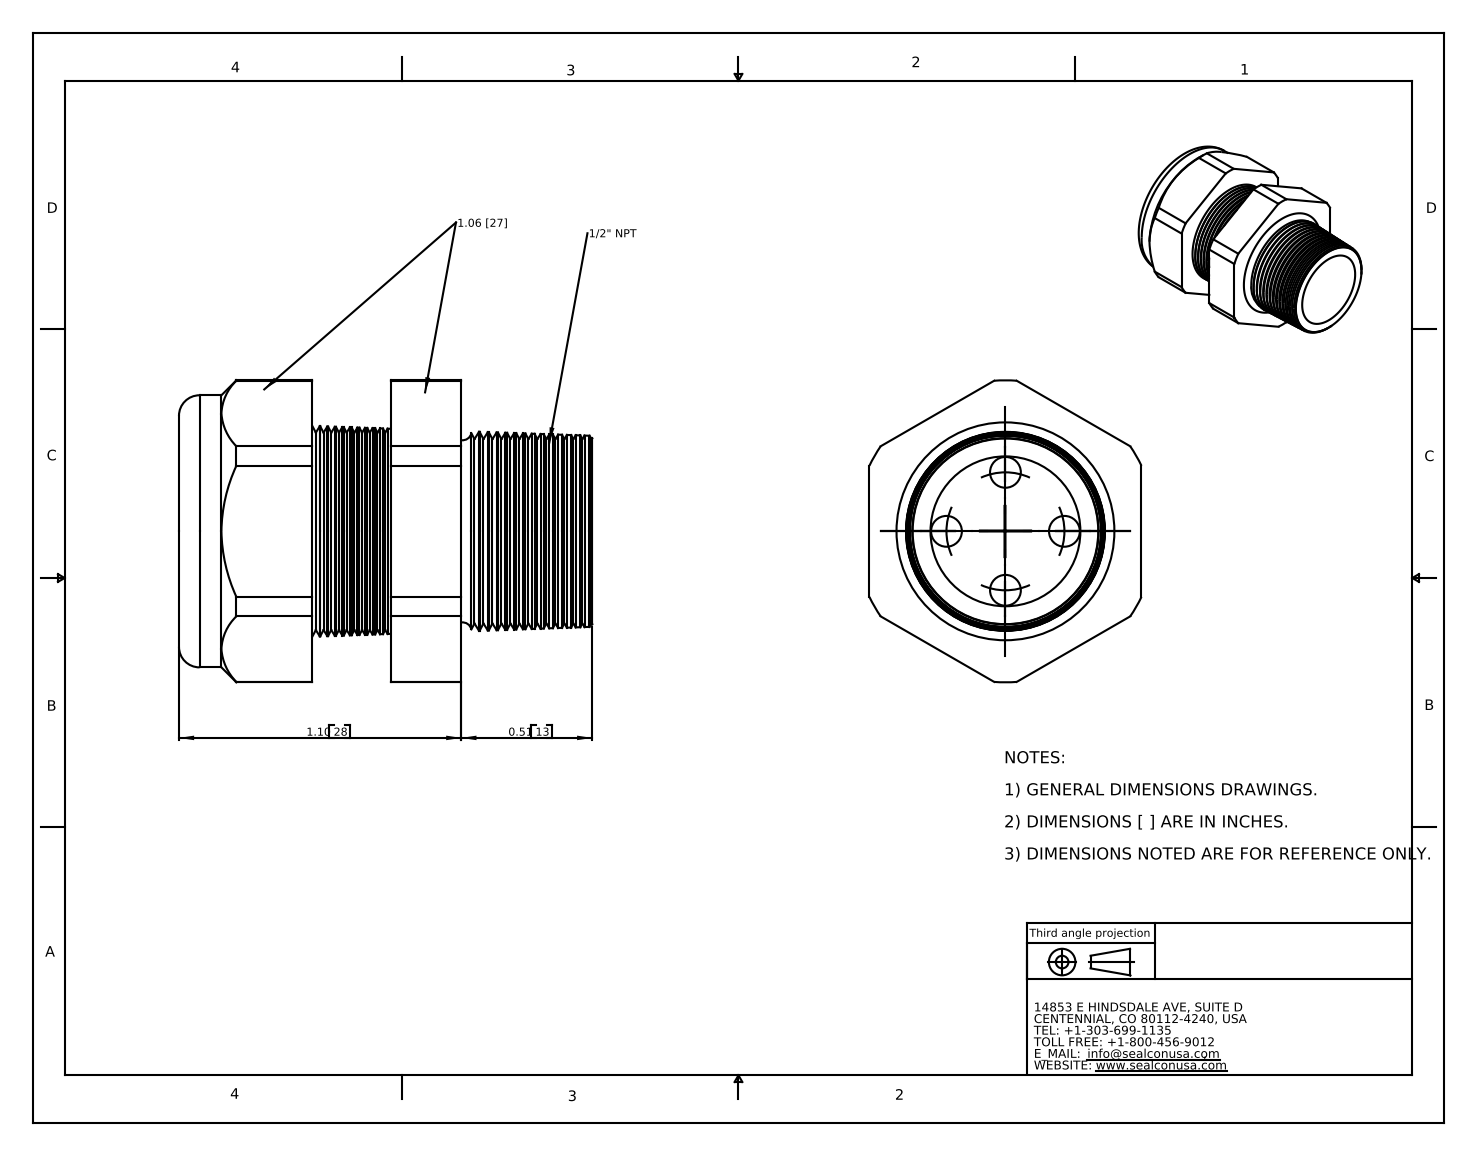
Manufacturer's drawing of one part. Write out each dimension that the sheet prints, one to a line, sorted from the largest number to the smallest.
1.10 28
0.51 13
